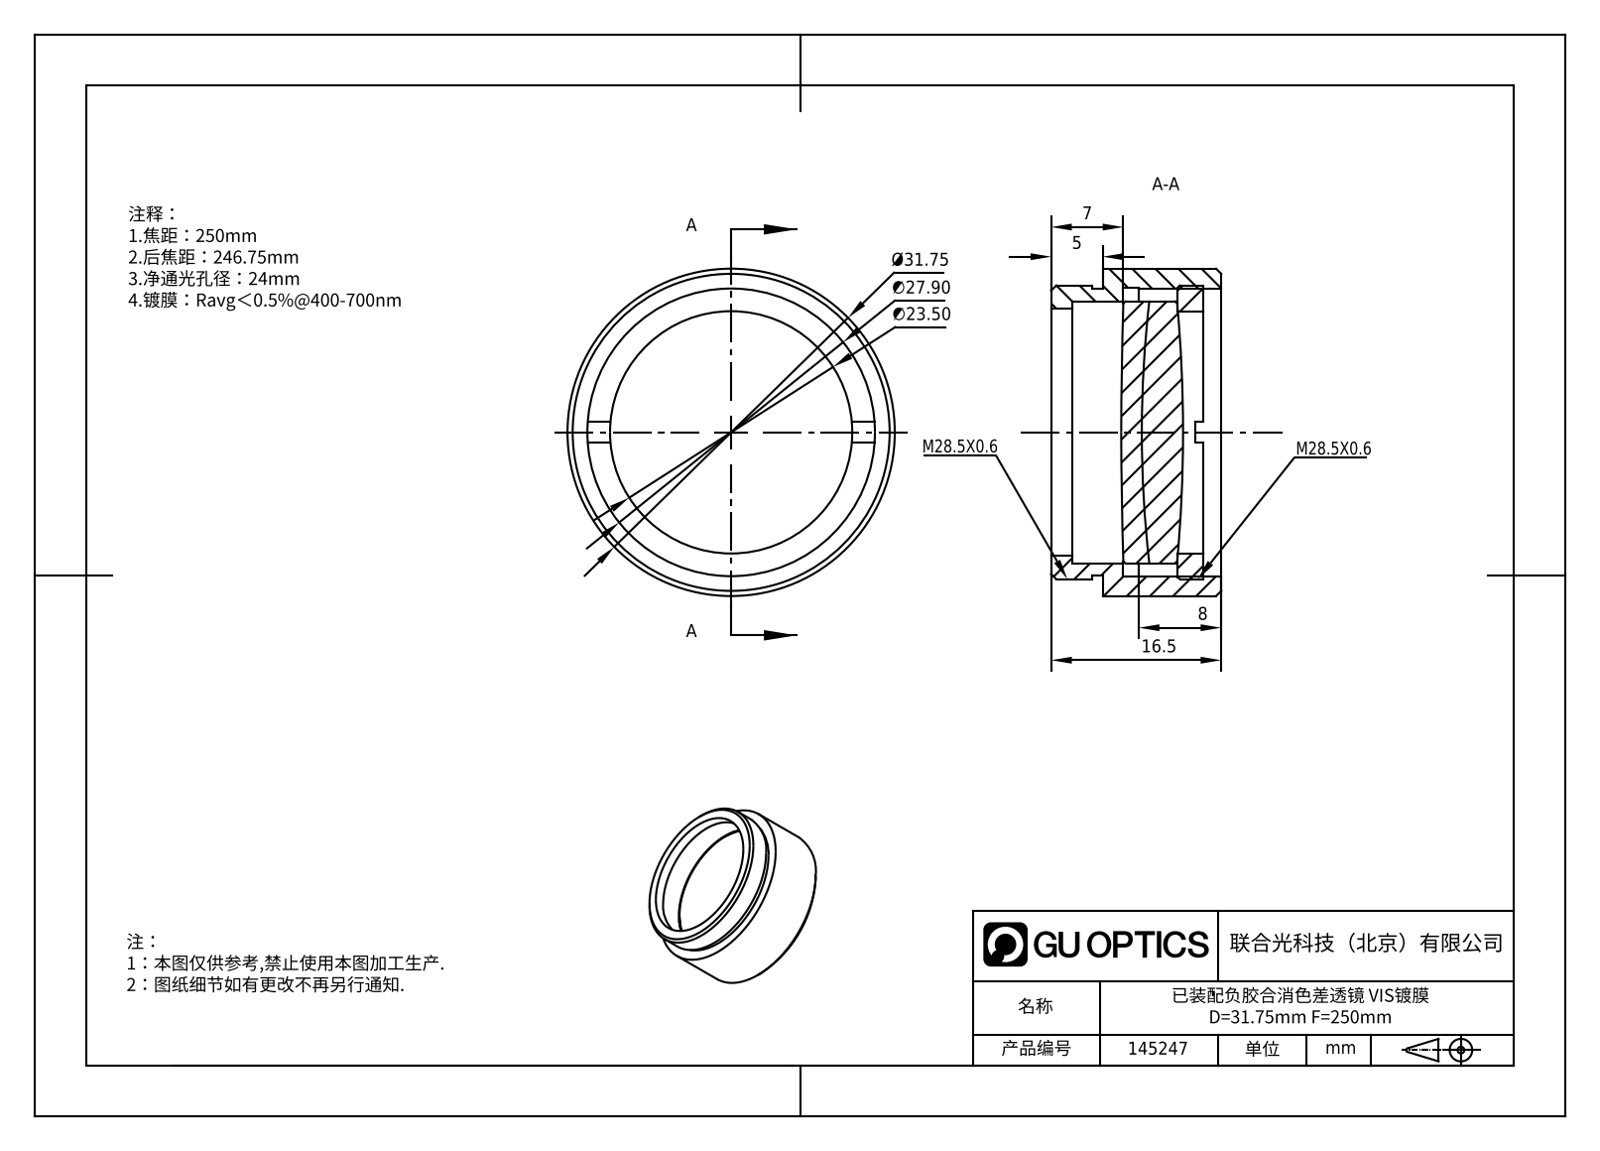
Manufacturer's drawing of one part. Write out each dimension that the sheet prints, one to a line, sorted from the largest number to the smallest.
Ø31.75
∅27.90
∅23.50
16.5
8
7
5
